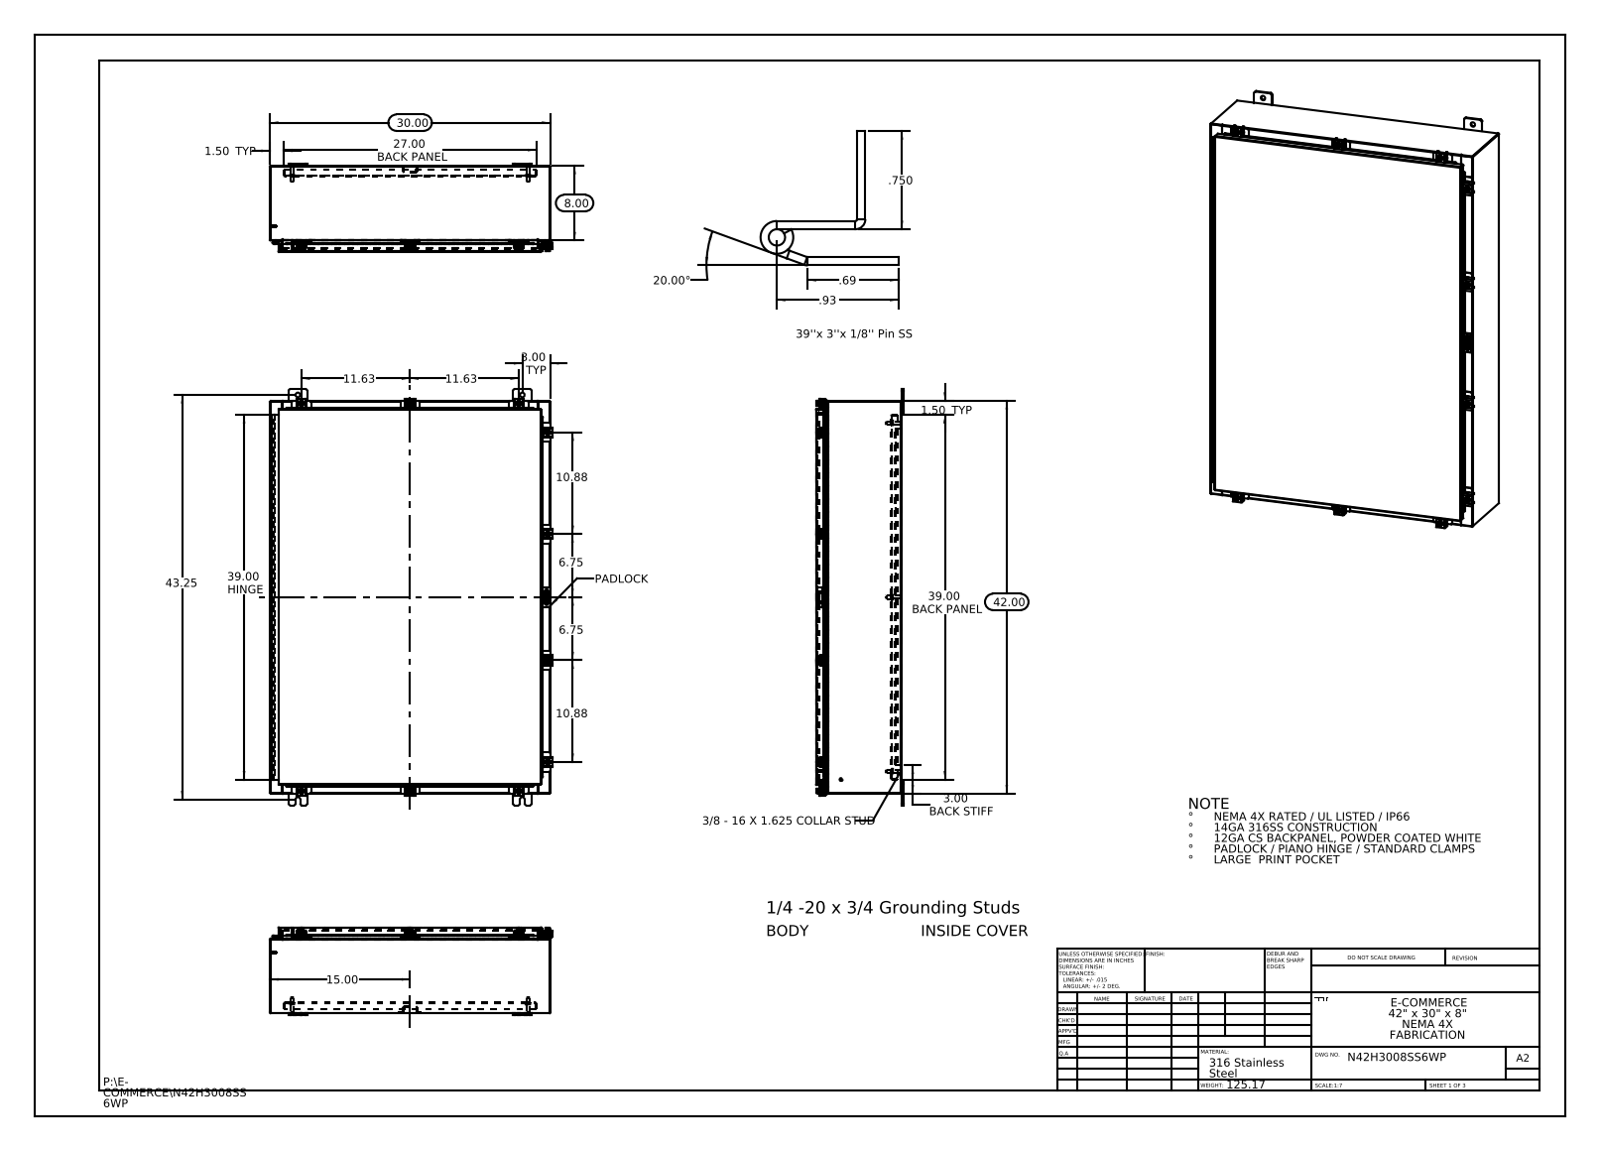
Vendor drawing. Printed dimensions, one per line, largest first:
43.25
42.00
39.00 HINGE
39.00 BACK PANEL
30.00
27.00 BACK PANEL
20.00°
15.00
11.63
11.63
10.88
10.88
8.00
6.75
6.75
3.00 TYP
3.00 BACK STIFF
1.50 TYP
1.50 TYP
.93
.750
.69
